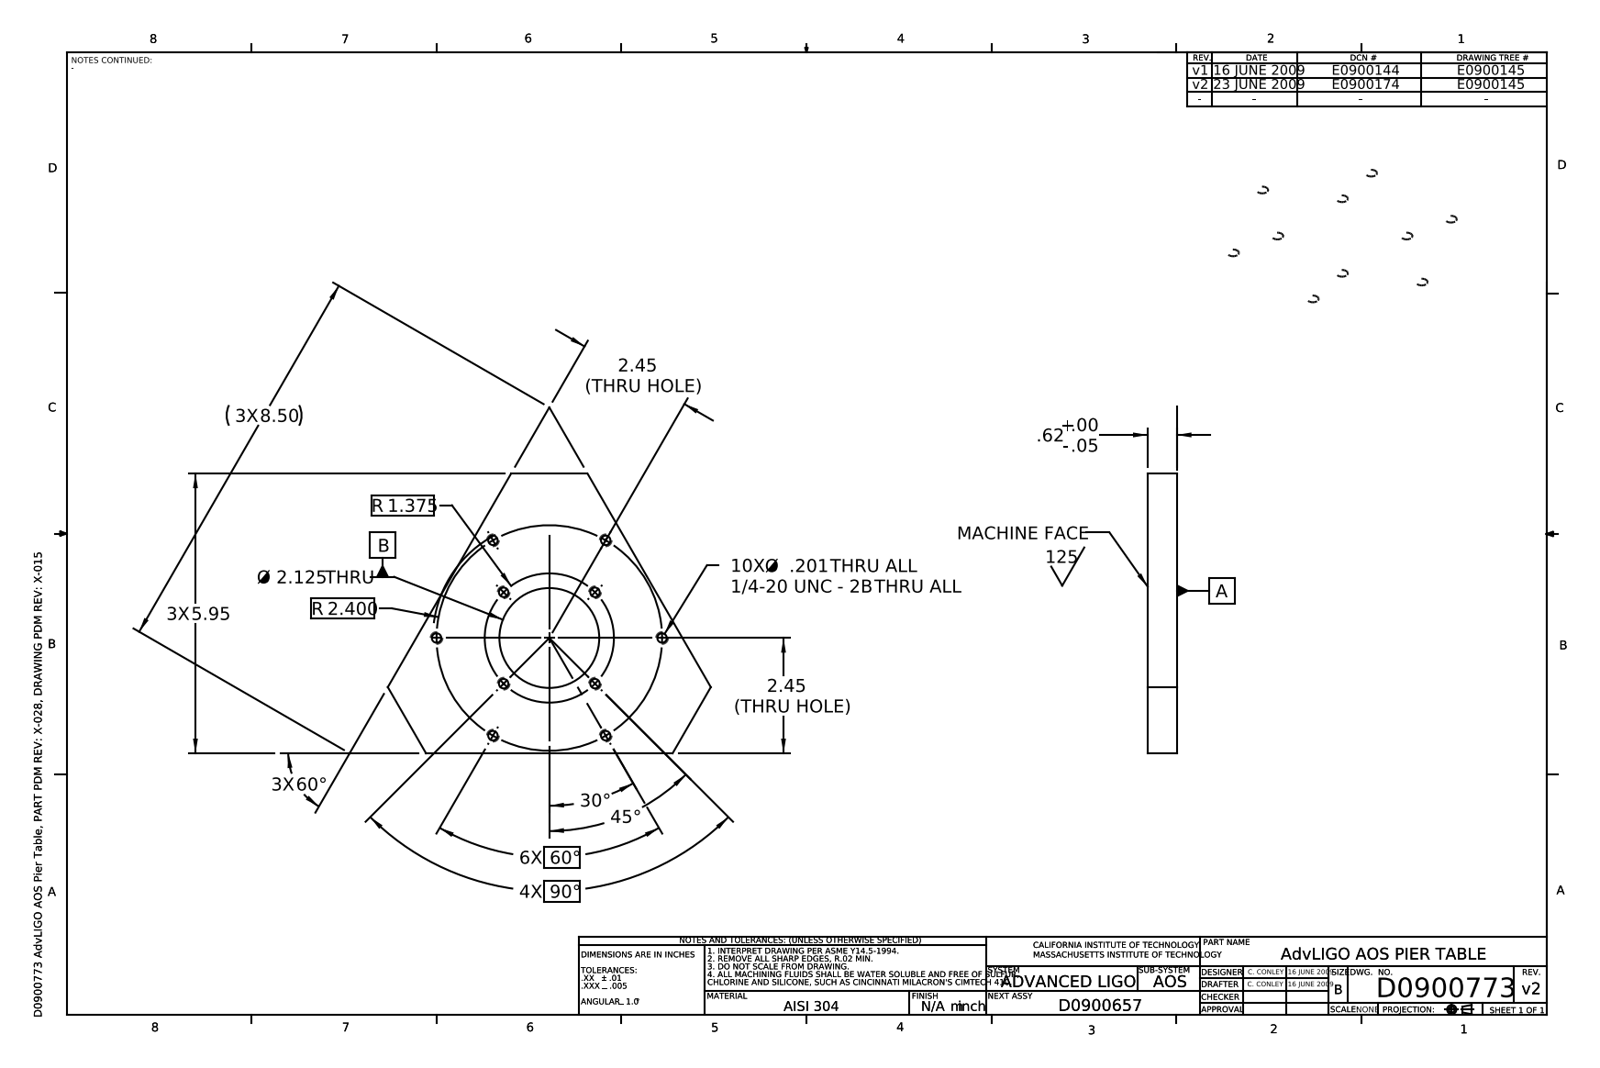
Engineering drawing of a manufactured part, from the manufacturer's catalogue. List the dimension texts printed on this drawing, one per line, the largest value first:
4X 90°
3X 60°
6X 60°
45°
30°
3X 8.50
3X 5.95
2.45 (THRU HOLE)
2.45 (THRU HOLE)
R 2.400
Ø 2.125 THRU
R 1.375
.62 - .05 + .00
1/4-20 UNC - 2B THRU ALL 10X Ø .201 THRU ALL
